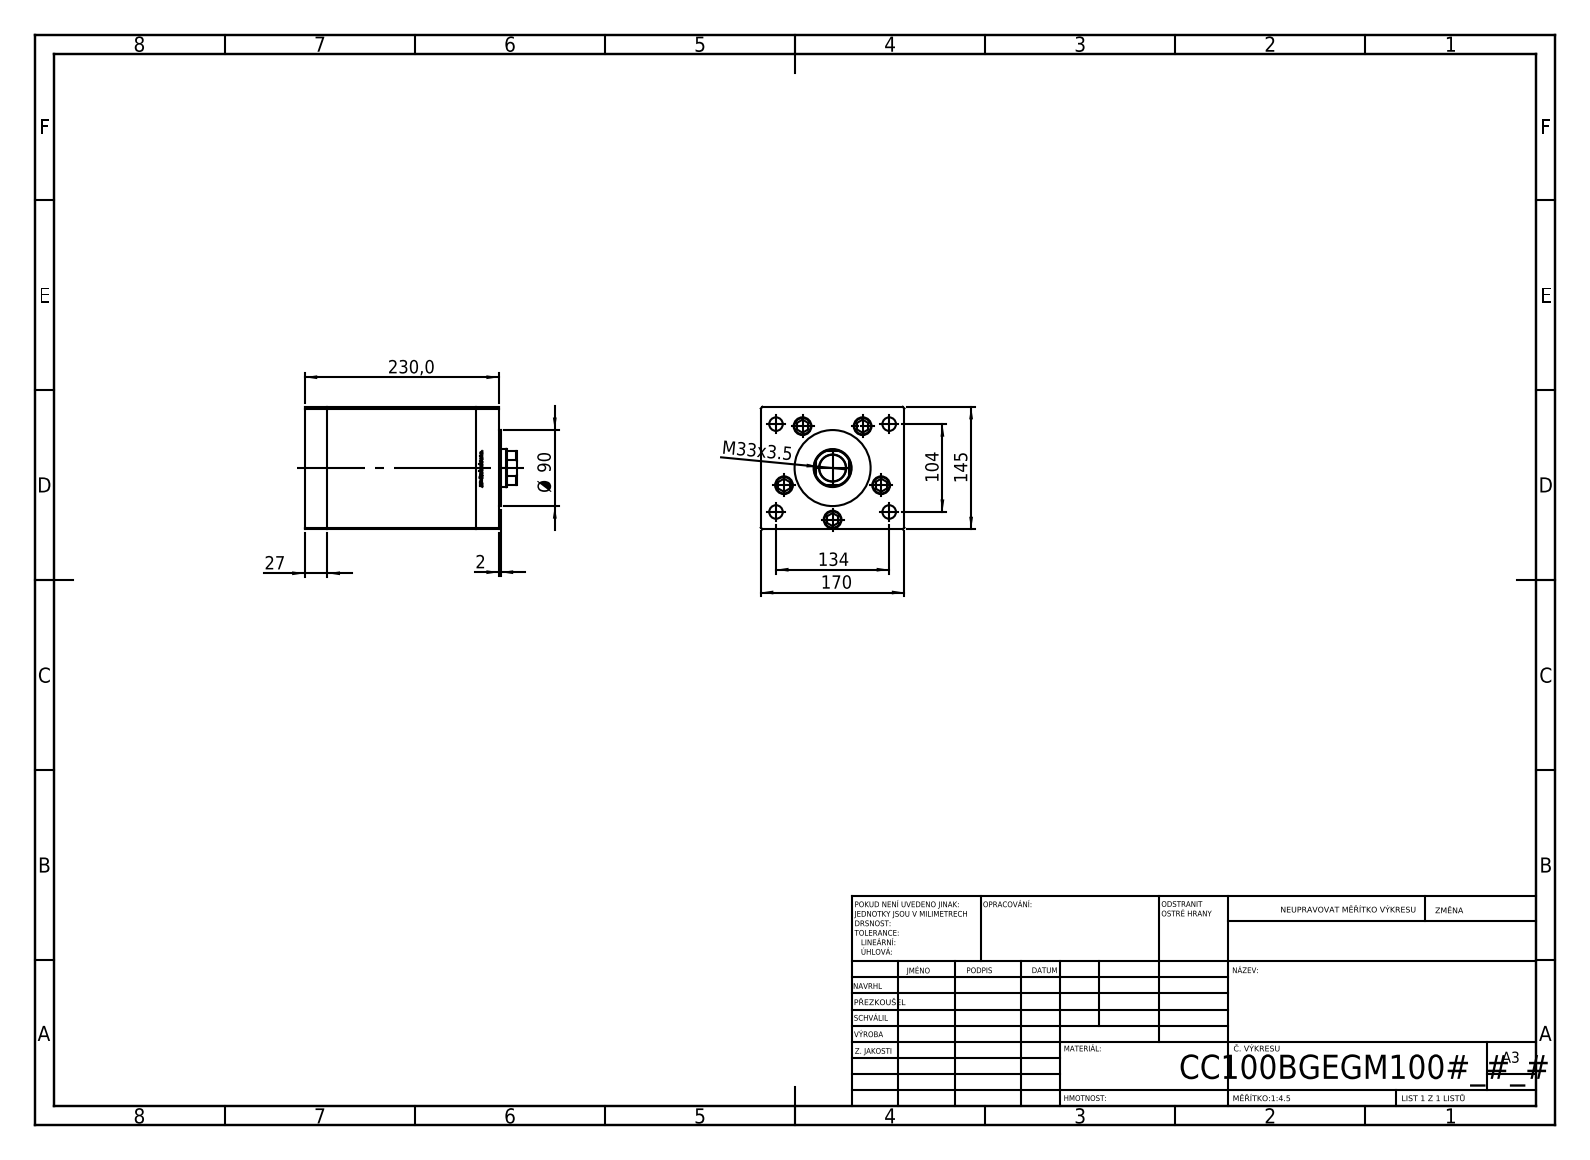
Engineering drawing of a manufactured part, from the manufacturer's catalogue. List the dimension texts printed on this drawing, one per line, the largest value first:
230,0
170
145
134
104
Ø 90
M33x3.5
27
2
